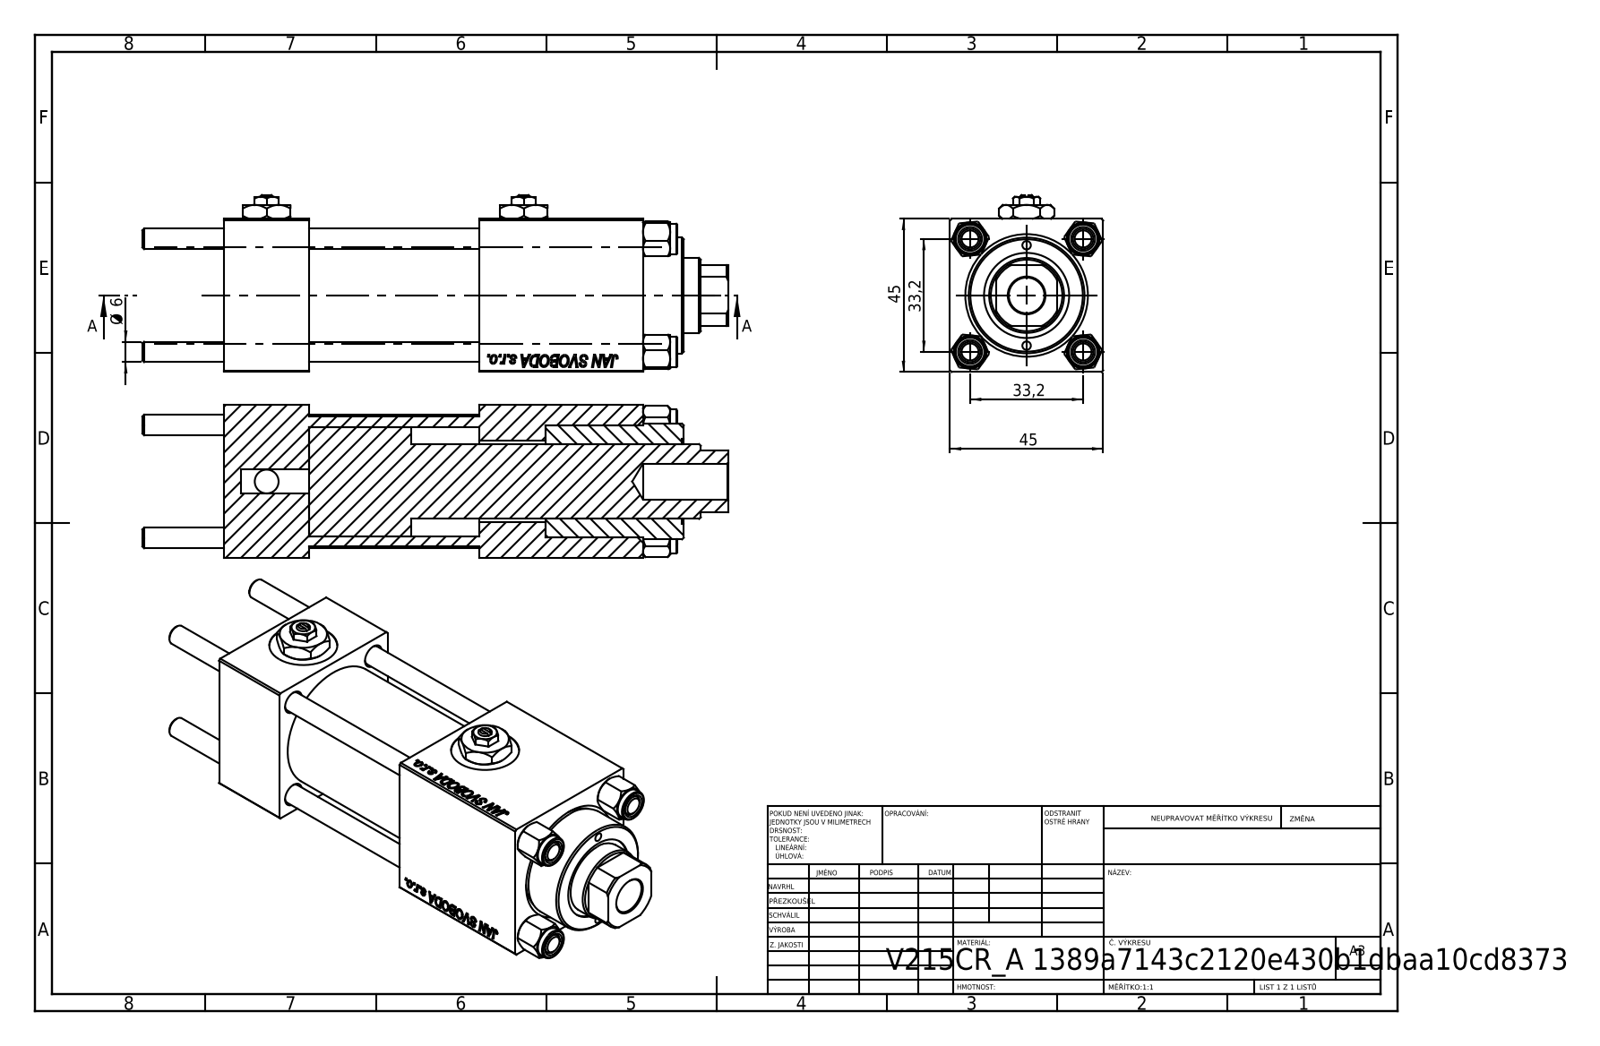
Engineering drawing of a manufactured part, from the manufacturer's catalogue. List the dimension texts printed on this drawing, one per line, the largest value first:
45
45
33,2
33,2
Ø 6
